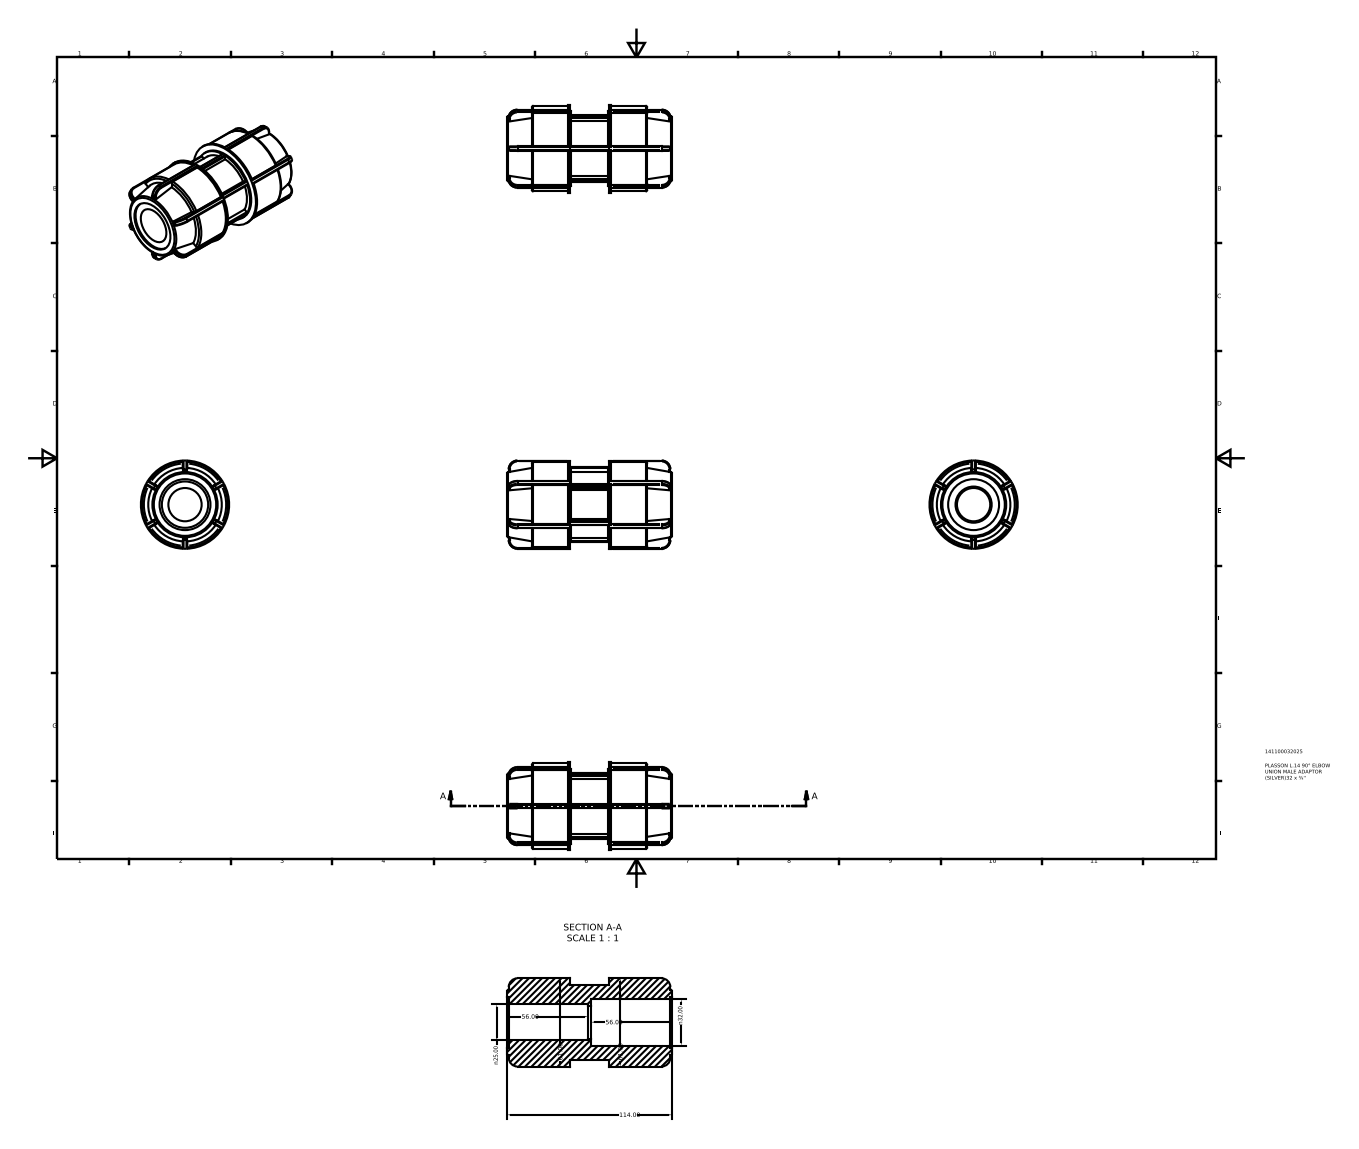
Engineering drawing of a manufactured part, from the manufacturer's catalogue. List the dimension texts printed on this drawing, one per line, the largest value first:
114.00
61.00
61.00
56.00
56.00
n32.00
n25.00
